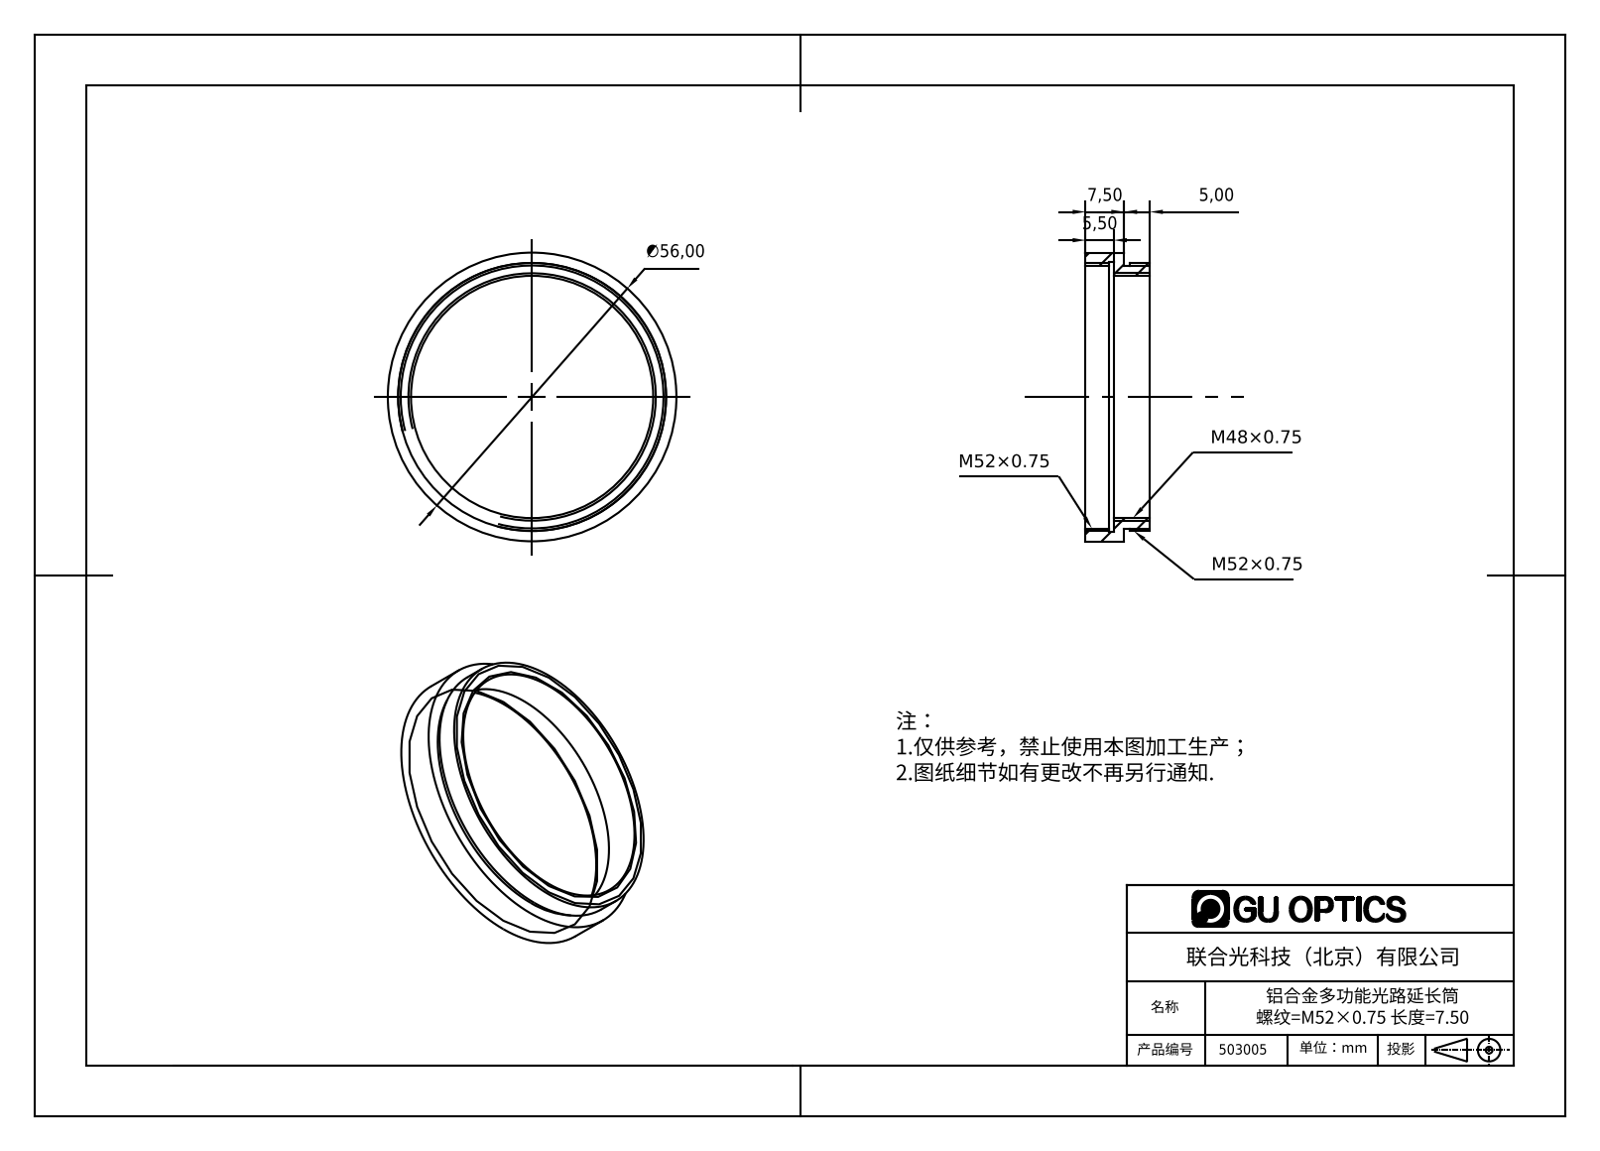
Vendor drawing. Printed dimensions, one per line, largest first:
∅56,00
7,50
5,50
5,00
